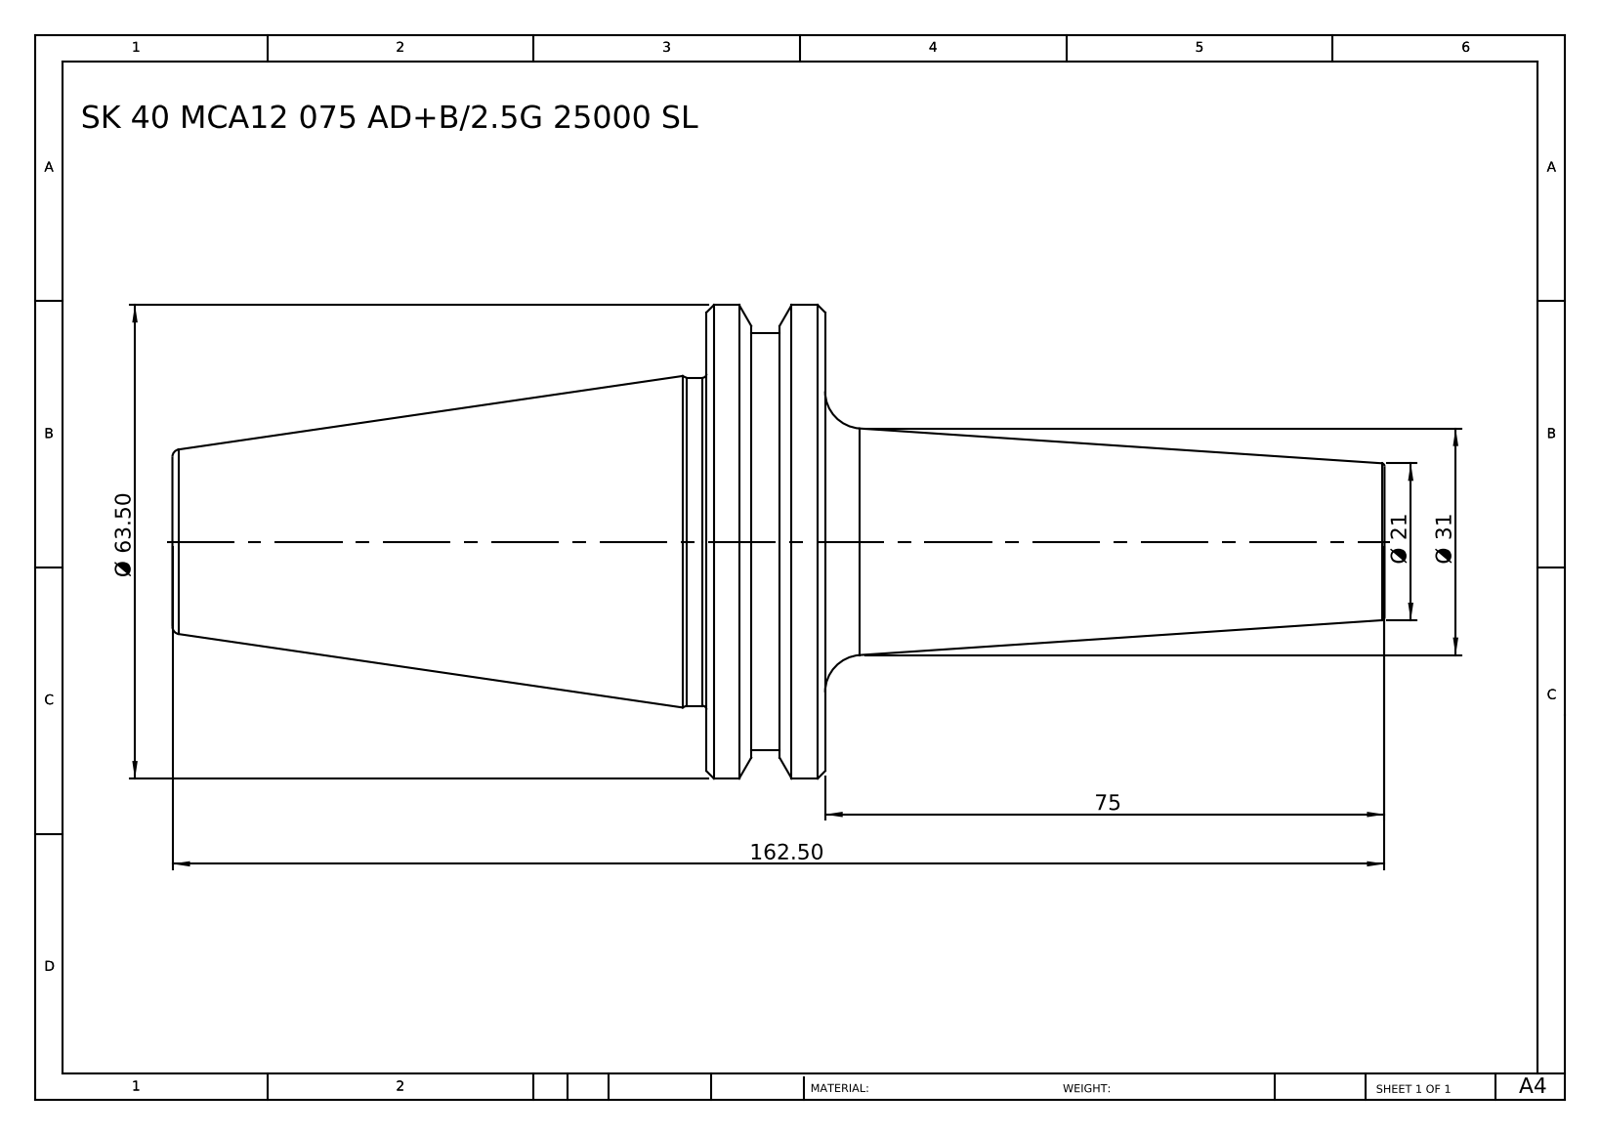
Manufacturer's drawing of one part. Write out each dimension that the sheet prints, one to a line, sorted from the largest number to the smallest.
162.50
75
Ø 63.50
Ø 31
Ø 21
